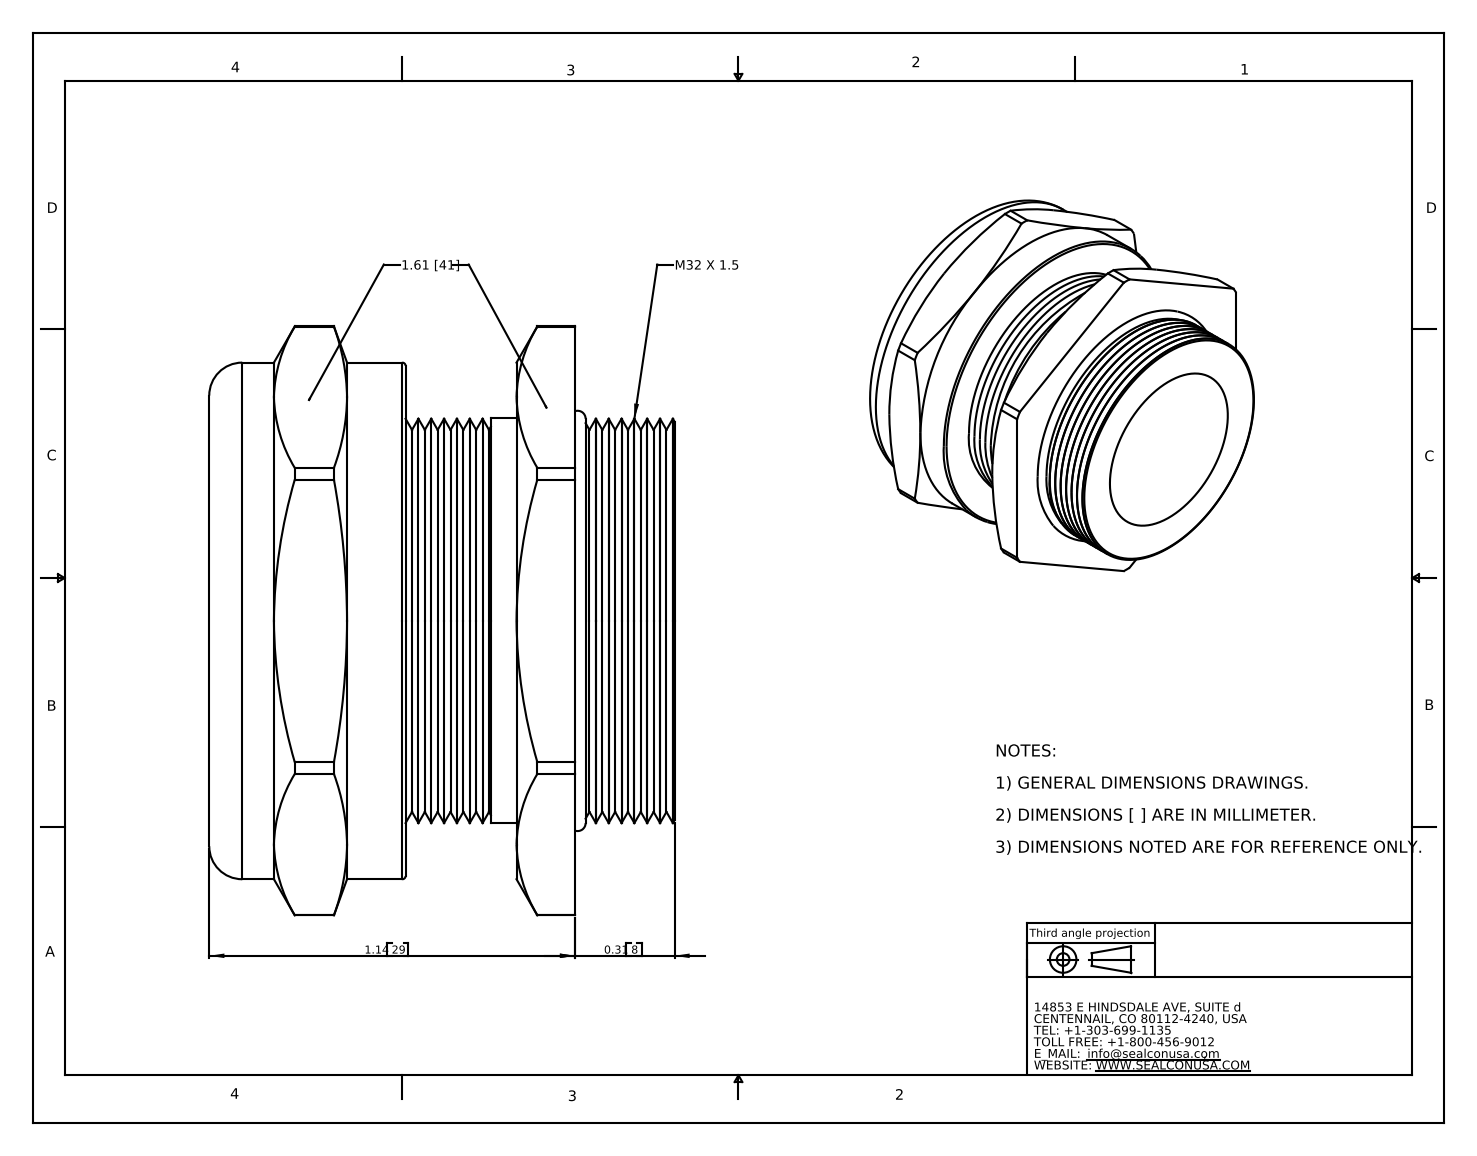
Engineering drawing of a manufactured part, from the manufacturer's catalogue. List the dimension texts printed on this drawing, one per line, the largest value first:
1.14 29
0.31 8
